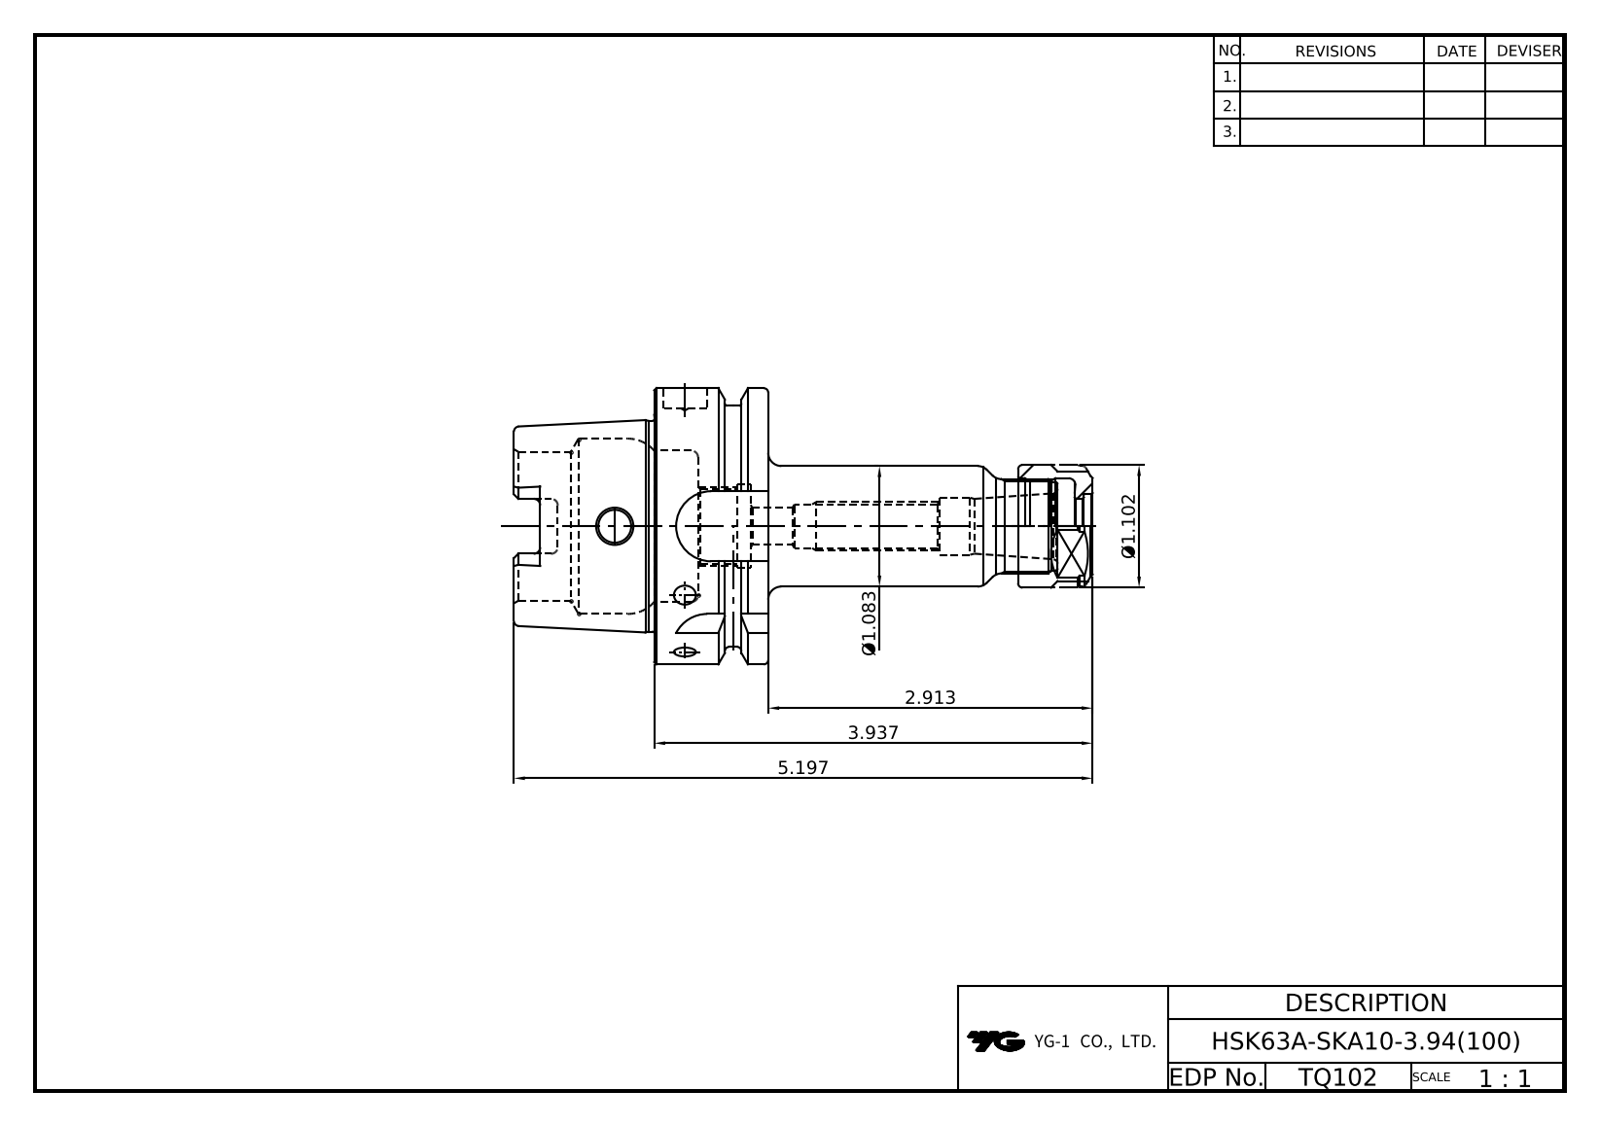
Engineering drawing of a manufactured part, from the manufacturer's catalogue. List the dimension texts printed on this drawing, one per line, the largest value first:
5.197
3.937
2.913
Ø1.102
Ø1.083
